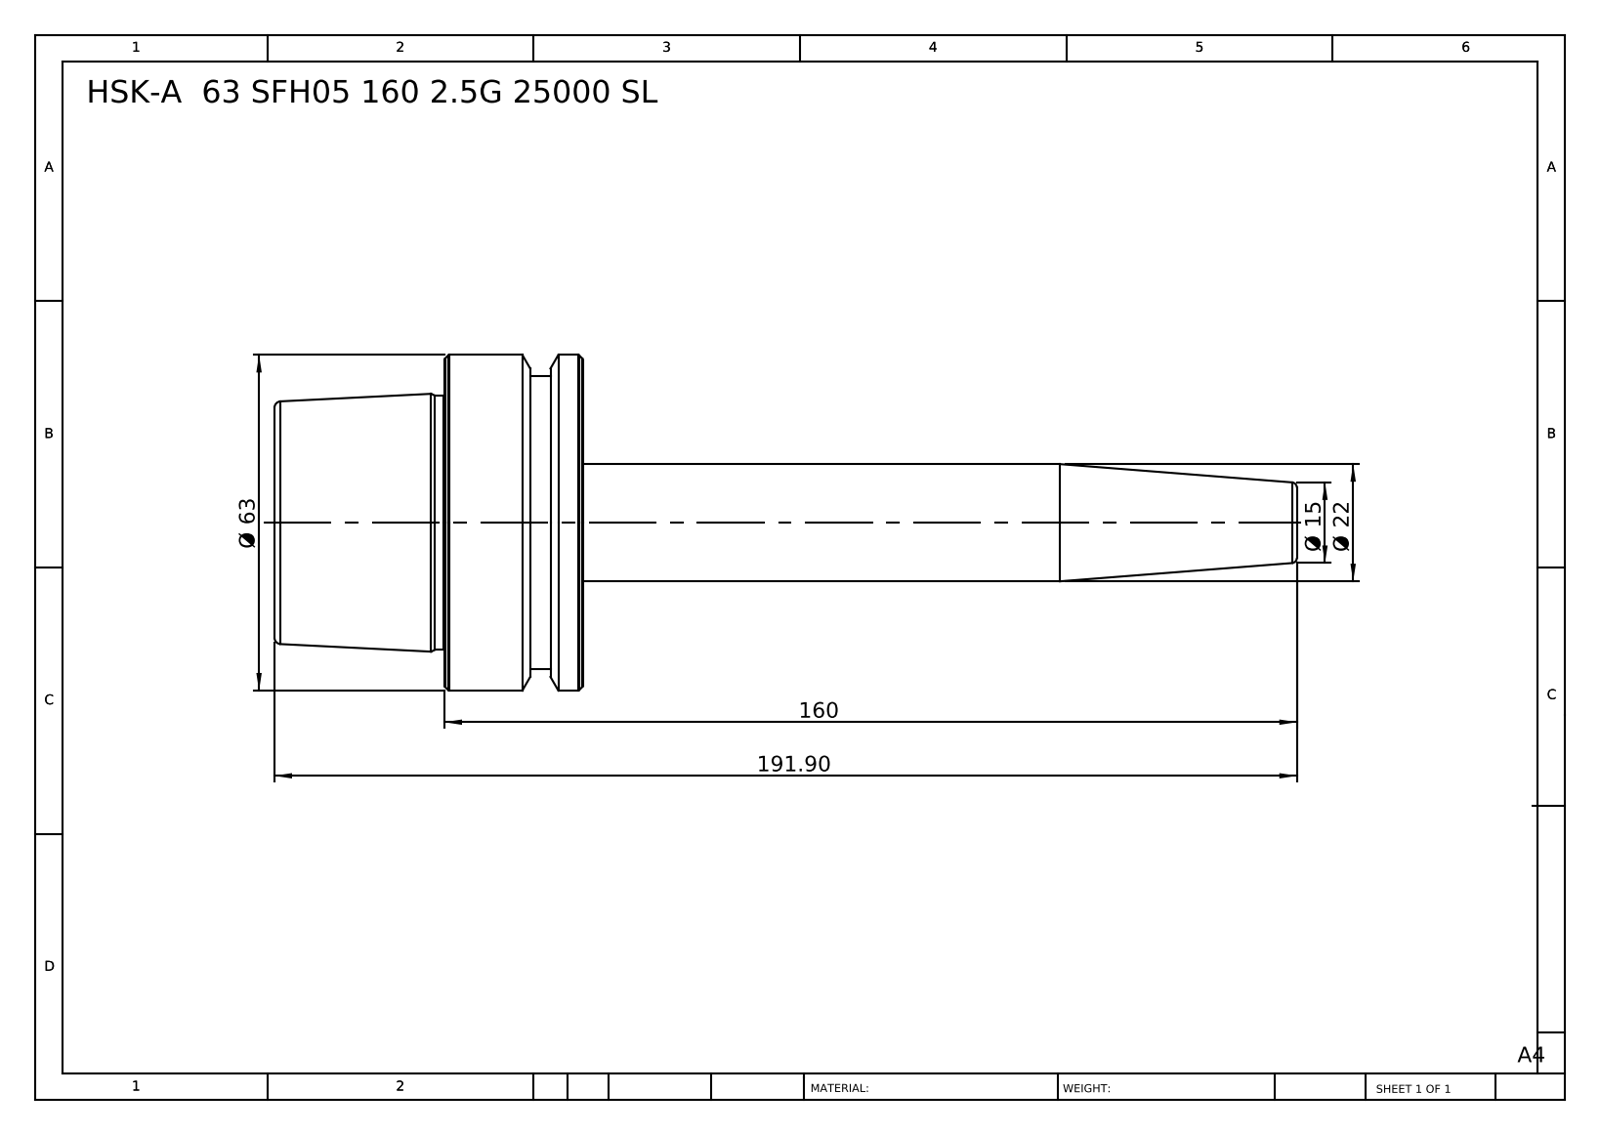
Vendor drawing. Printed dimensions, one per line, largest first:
191.90
160
Ø 63
Ø 22
Ø 15
